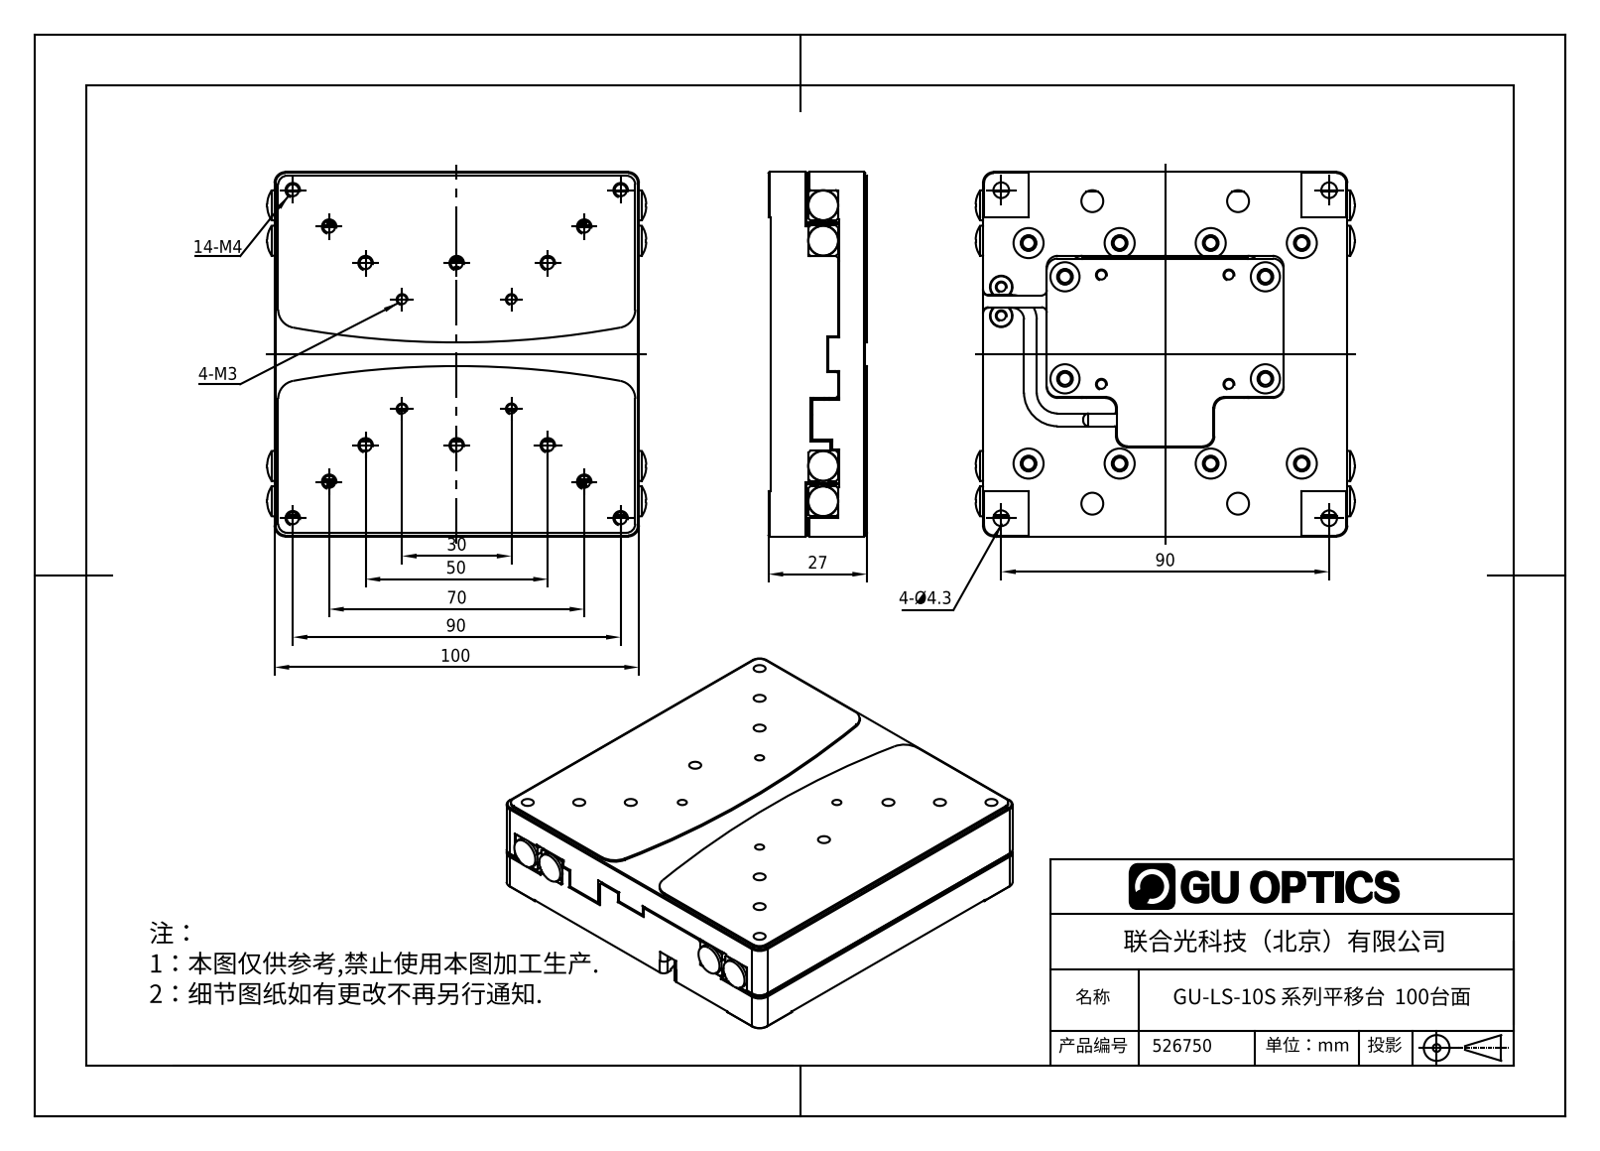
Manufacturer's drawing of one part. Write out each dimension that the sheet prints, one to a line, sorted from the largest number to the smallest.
100
90
90
70
50
30
27
